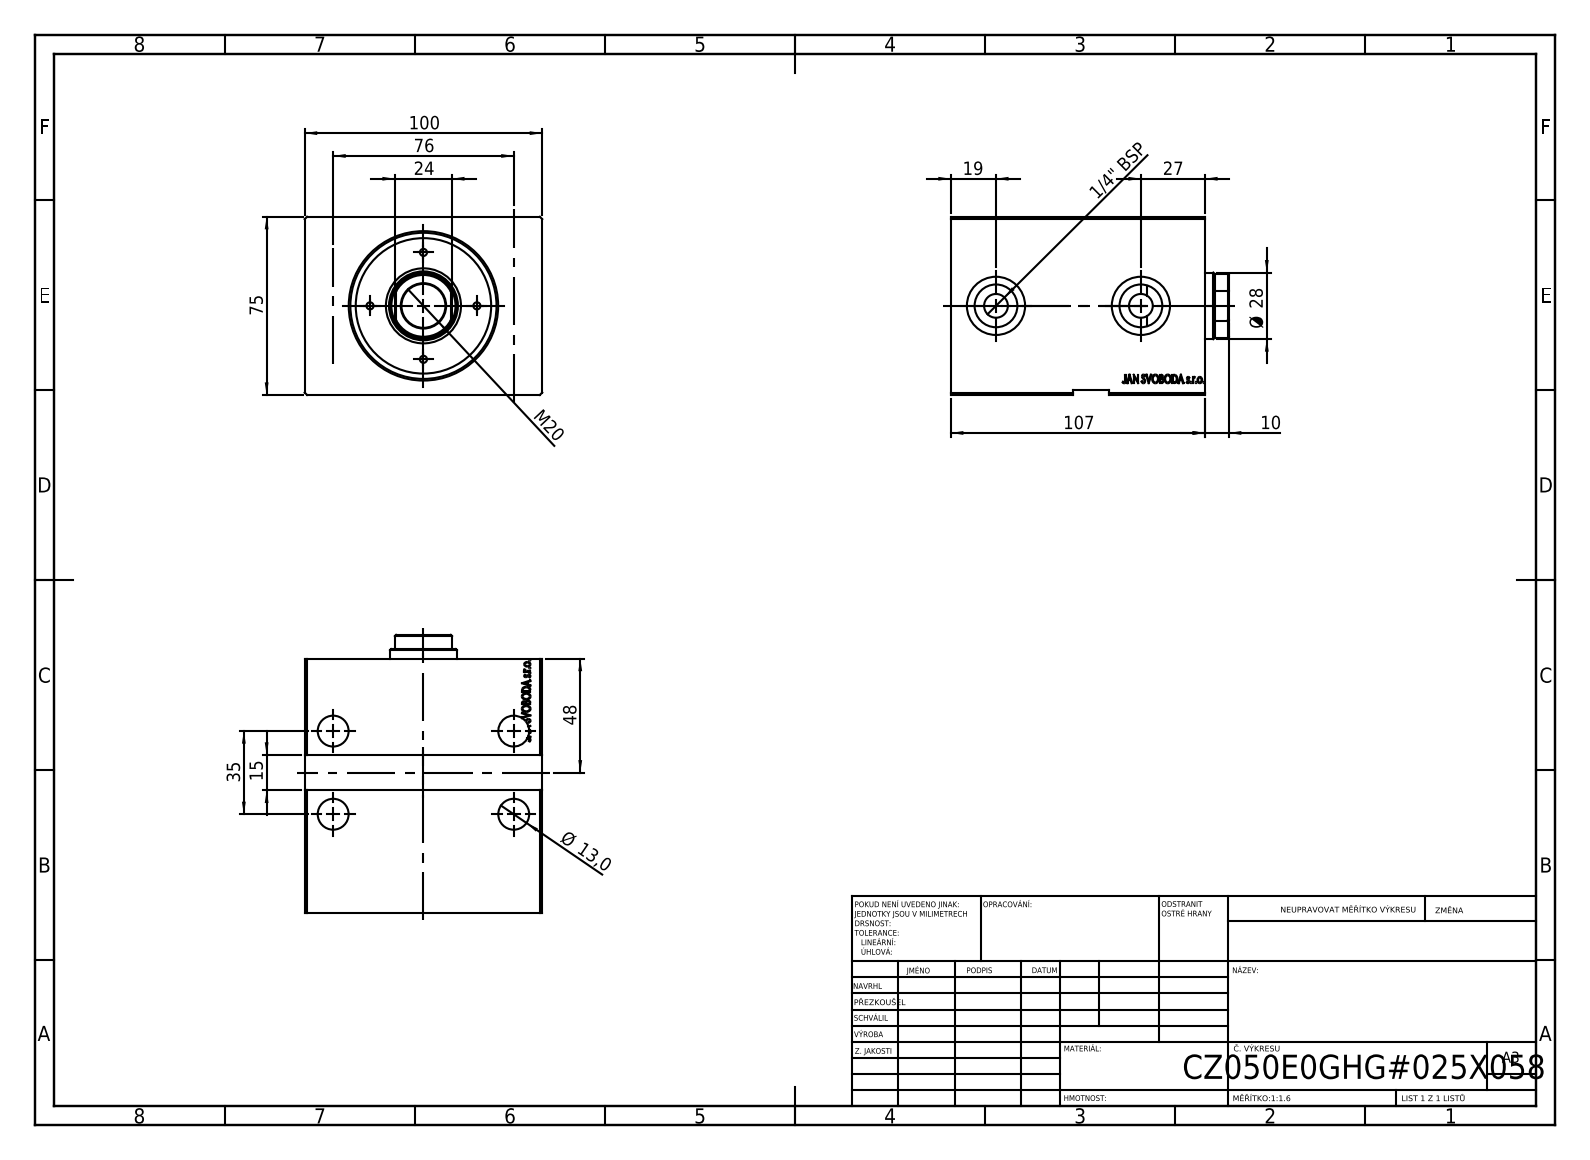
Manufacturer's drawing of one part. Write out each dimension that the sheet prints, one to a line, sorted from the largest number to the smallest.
107
100
76
75
48
35
Ø 28
27
24
M20
19
15
Ø 13,0
10
1/4" BSP
